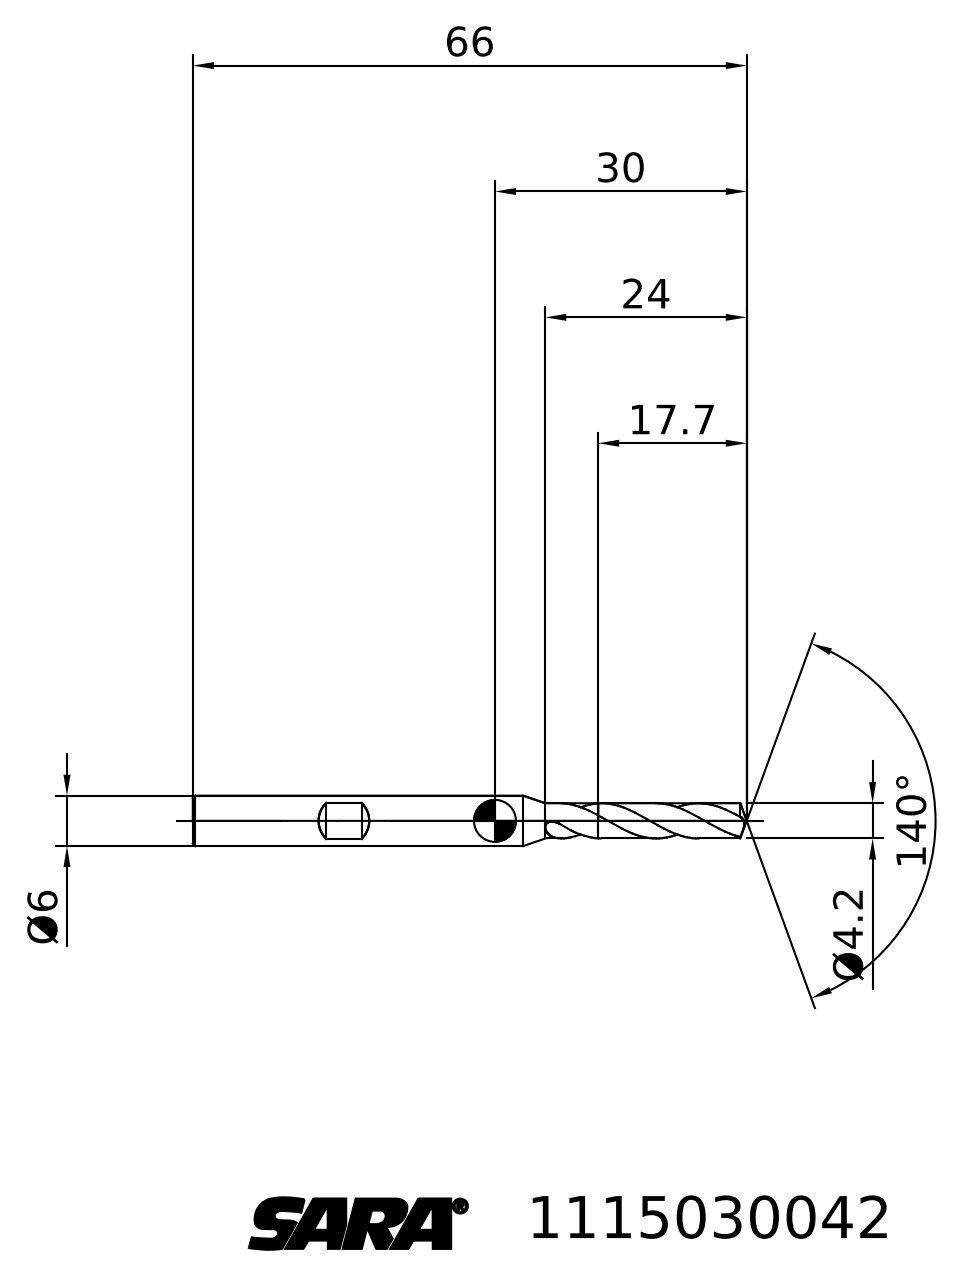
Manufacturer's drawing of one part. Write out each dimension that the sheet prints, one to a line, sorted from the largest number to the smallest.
140°
66
30
24
17.7
Ø6
Ø4.2
